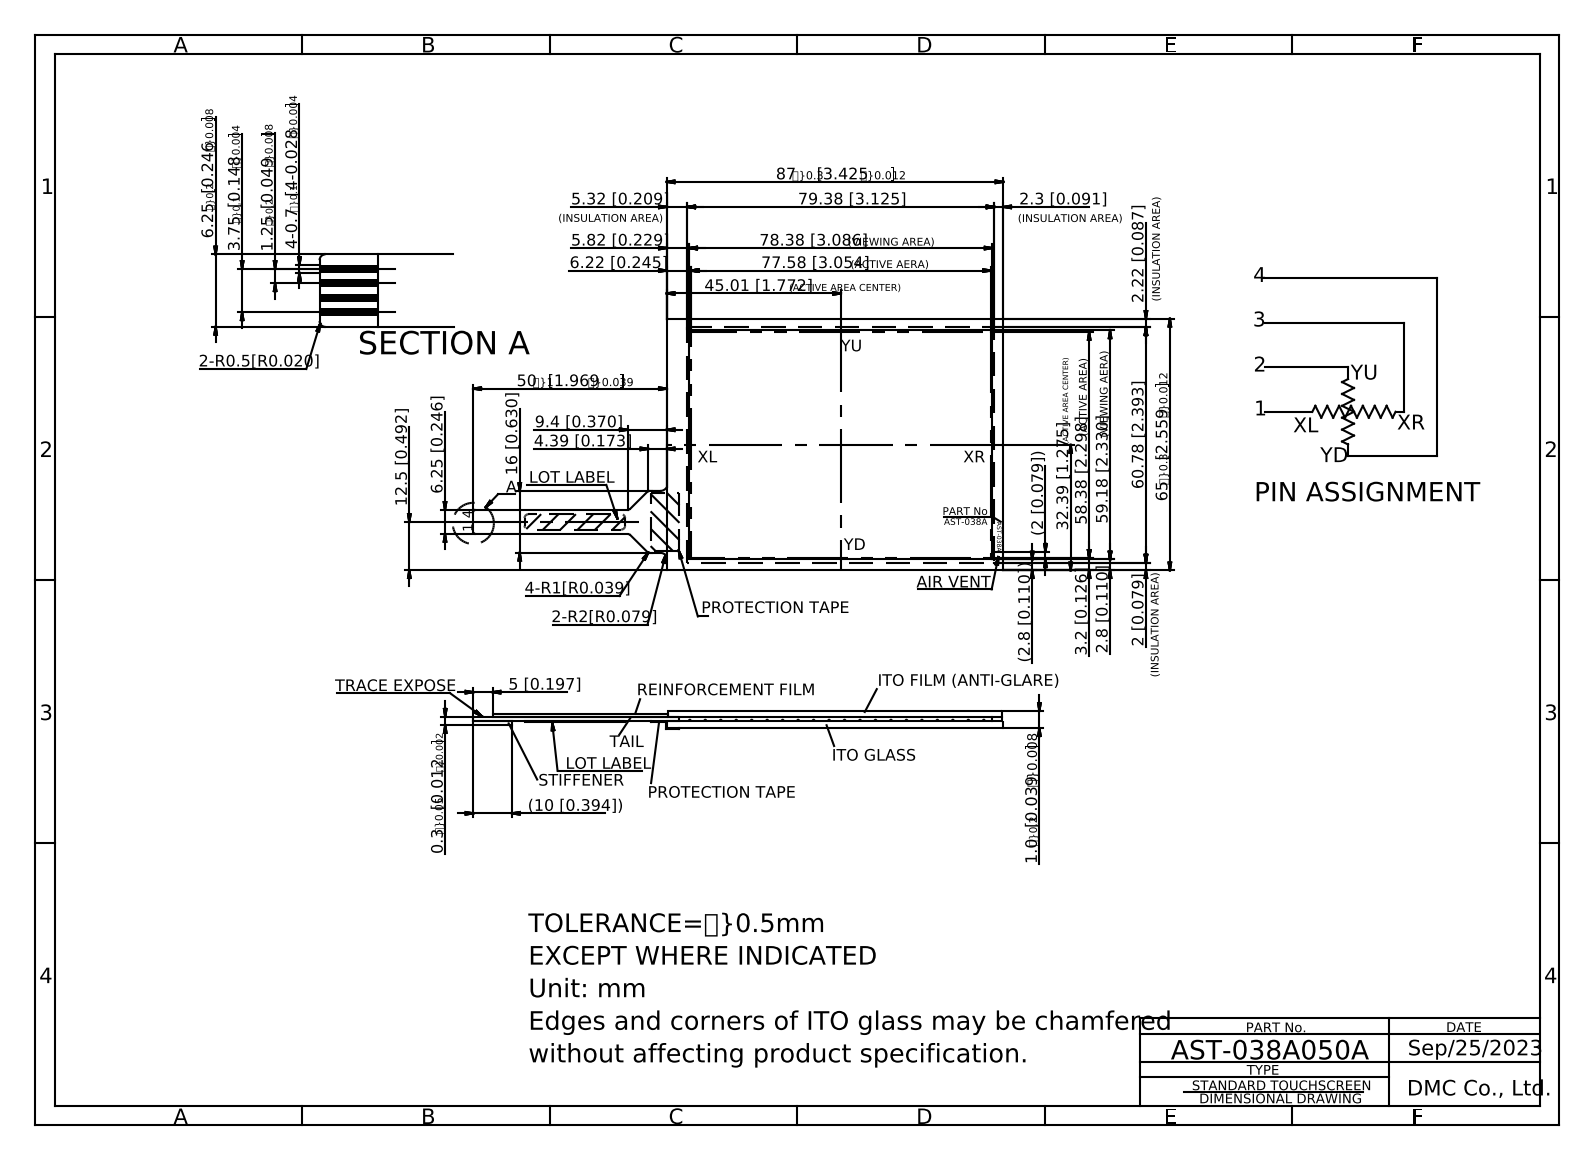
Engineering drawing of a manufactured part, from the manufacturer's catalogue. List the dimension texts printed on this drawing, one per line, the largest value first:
87.00
79.38 [3.125]
78.38{\H0.6667x;(VIEWING AREA)}
77.58{\H0.6667x;(ACTIVE AERA)}
65.00
60.78 [2.393]
59.18{\H0.6667x;(VIEWING AERA)}
58.38{\H0.6667x;(ACTIVE AREA)}
50.00
45.01{\H0.6x;(ACTIVE AREA CENTER)}
32.39{\H0.4667x;(ACTIVE AREA CENTER)}
16 [0.630]
12.5 [0.492]
(10 [0.394])
9.4 [0.370]
6.25{\H0.6x;?}0.2}[0.246{\H0.66667x;?}0.008}]
6.25 [0.246]
6.22 [0.245]
5.82 [0.229]
5.32 [0.209]
5 [0.197]
4.39 [0.173]
4-0.7{\H0.6x;?}0.1}[4-0.028{\H0.66667x;?}0.004}]
3.75{\H0.6x;?}0.1}[0.148{\H0.66667x;?}0.004}]
3.2 [0.126]
(2.8 [0.110])
2.8 [0.110]
2.3 [0.091]
2.22 [0.087]
2 [0.079]
(2 [0.079])
1.25{\H0.6x;?}0.2}[0.049{\H0.66667x;?}0.008}]
1.0{\H0.6667x;?}0.2}[0.039{\H0.83333x;?}0.008}]
0.3{\H0.6667x;?}0.05}[0.012{\H0.6x;?}0.002}]
